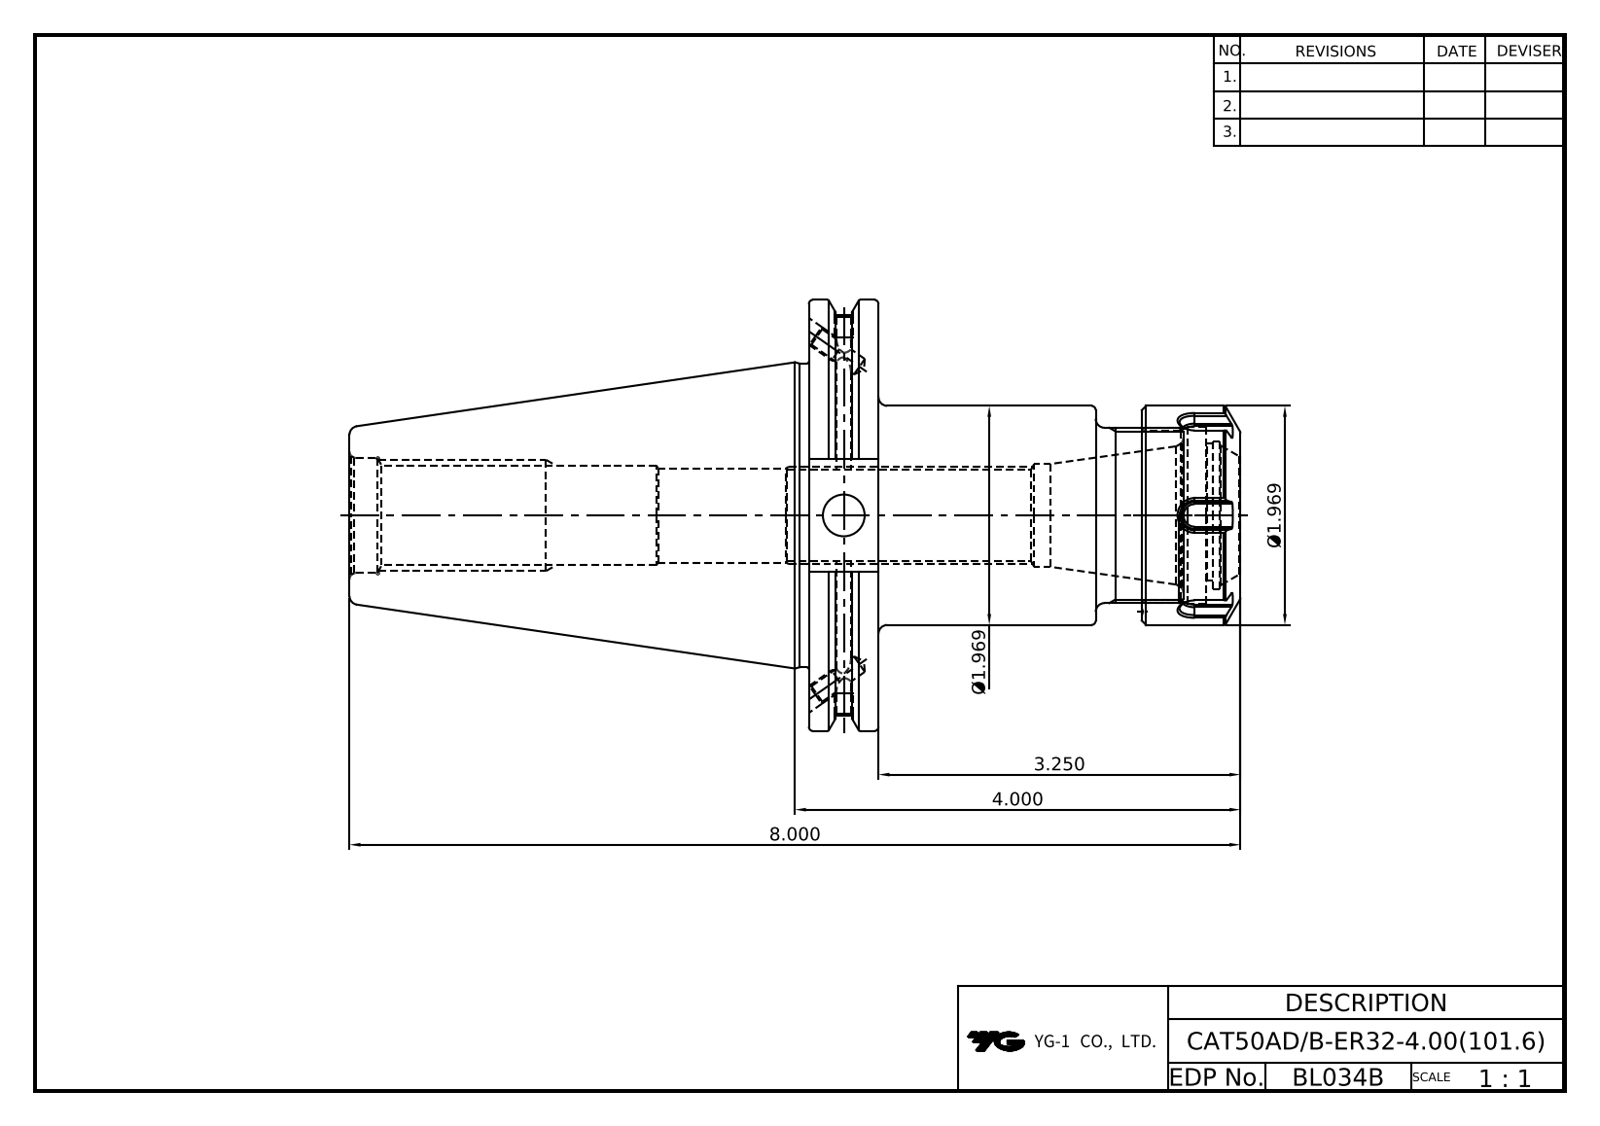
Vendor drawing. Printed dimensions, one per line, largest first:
8.000
4.000
3.250
Ø1.969
Ø1.969
